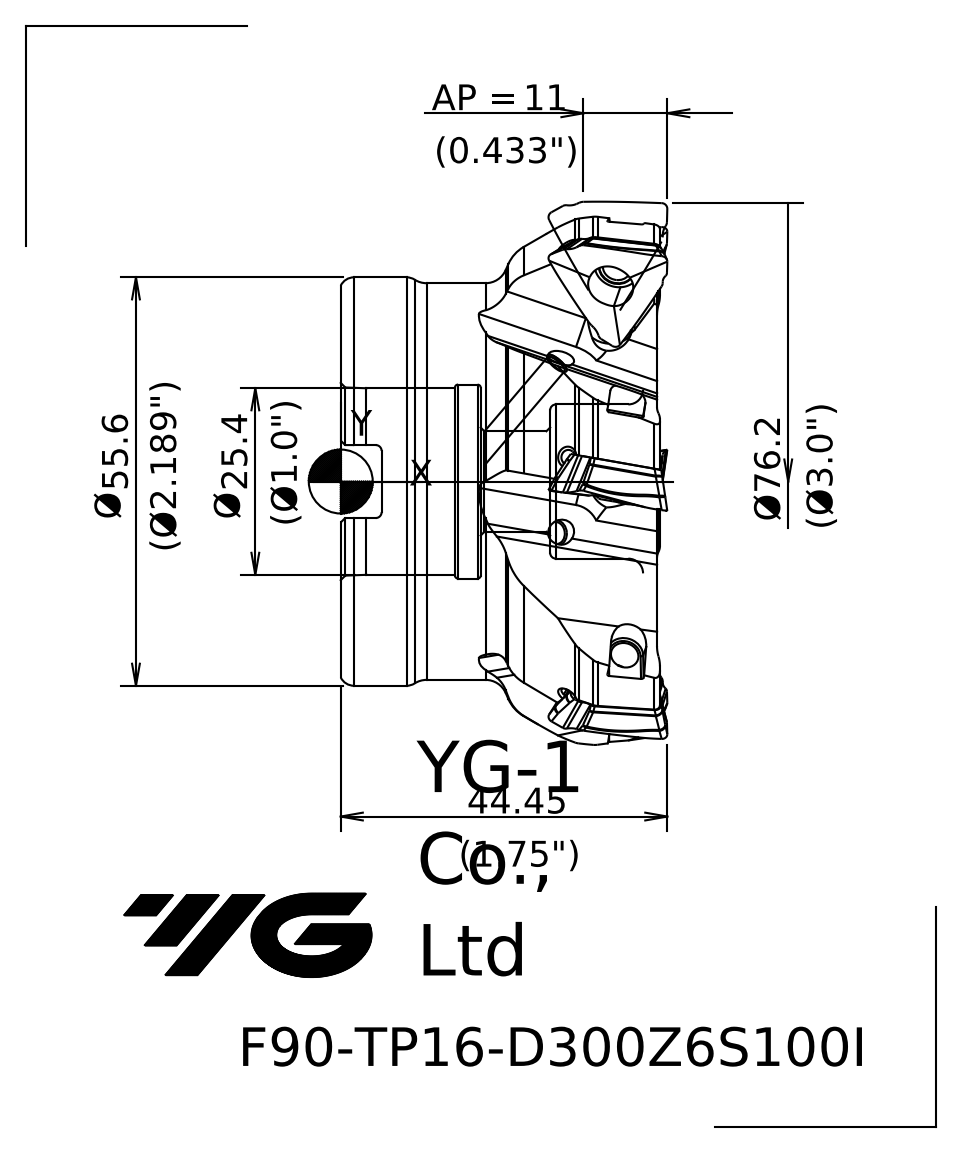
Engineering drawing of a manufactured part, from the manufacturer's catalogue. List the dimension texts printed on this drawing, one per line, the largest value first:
44.45
25.4 Ø
AP = 11
